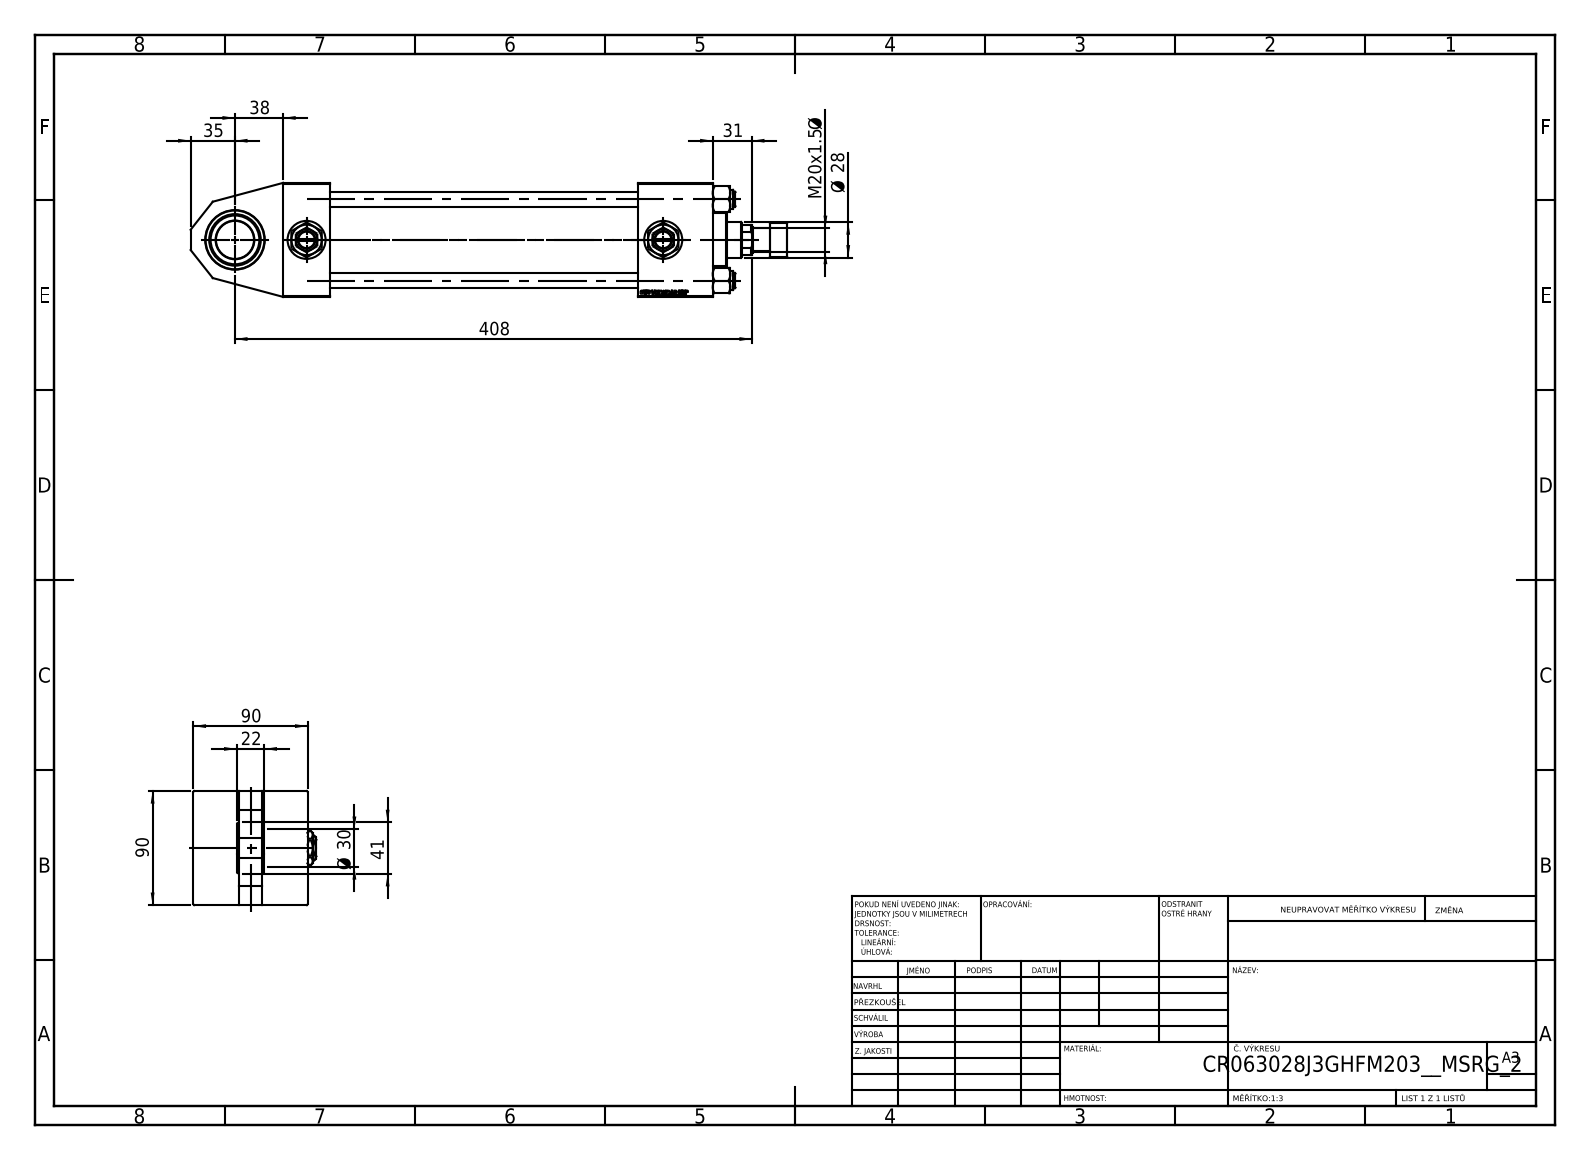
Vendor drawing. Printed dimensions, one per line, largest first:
408
90
90
41
38
35
31
Ø 30
Ø 28
22
M20x1.5 Ø
